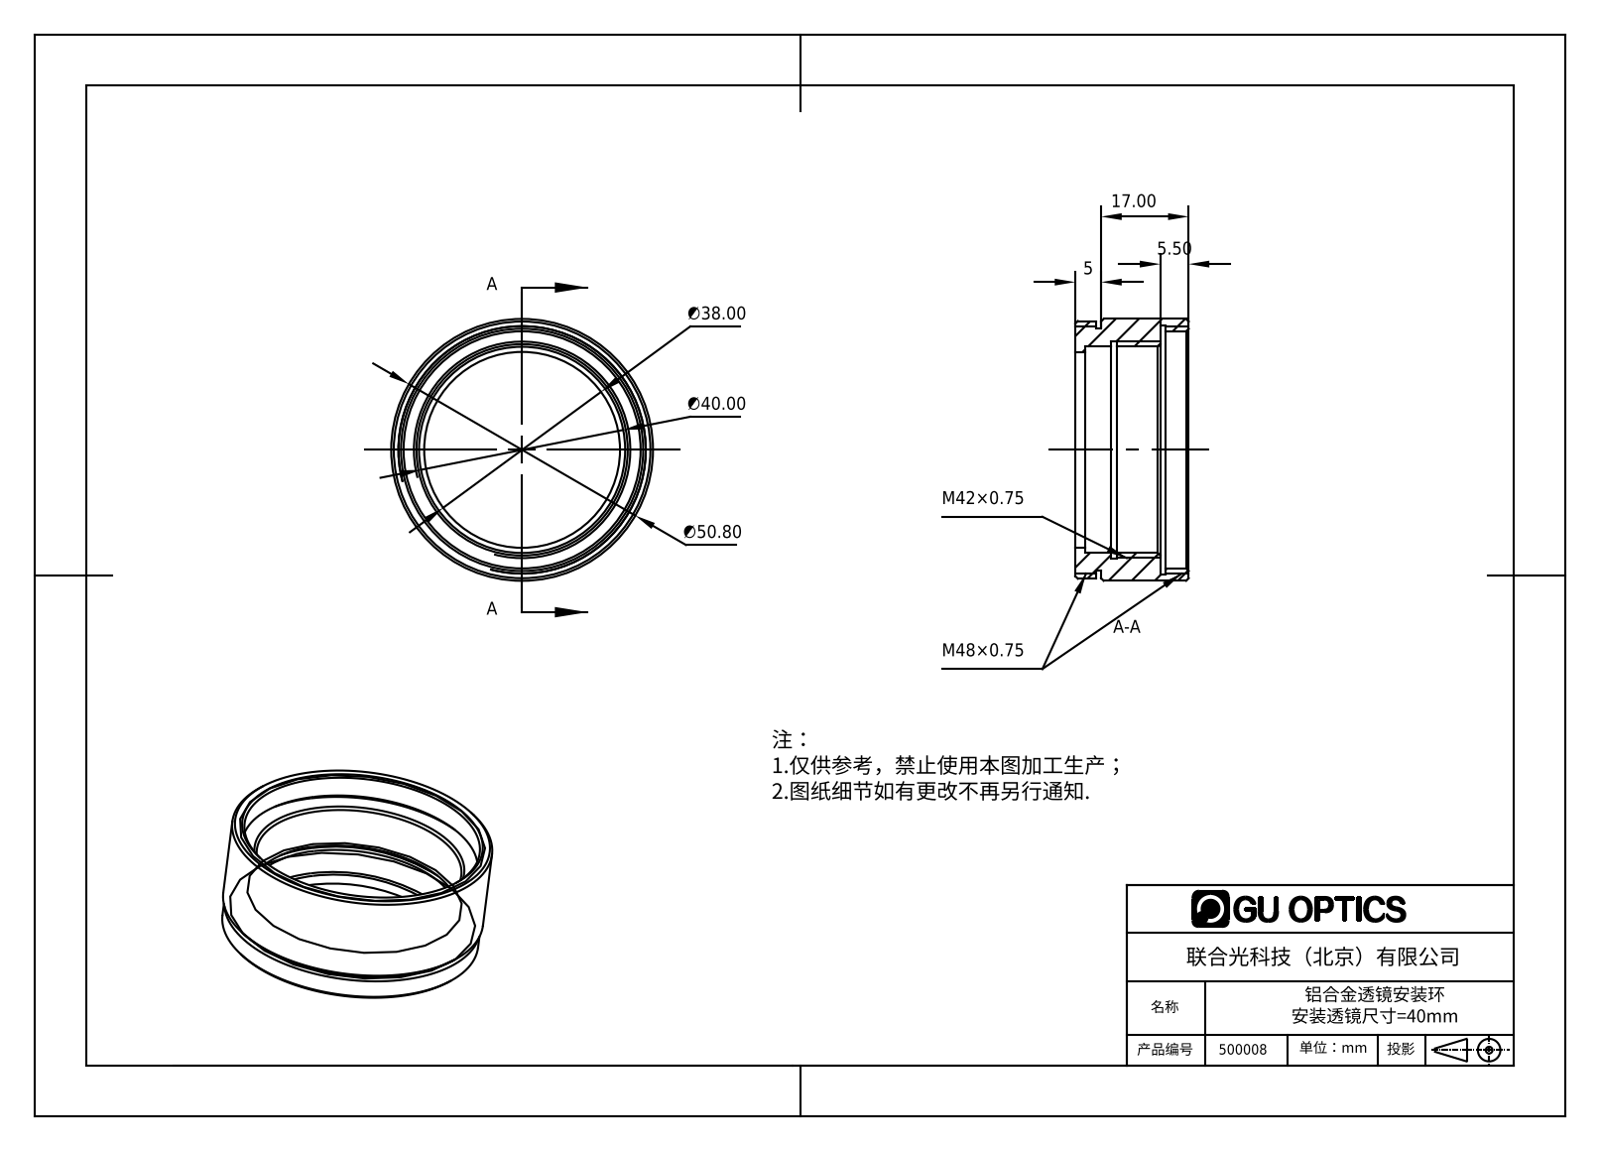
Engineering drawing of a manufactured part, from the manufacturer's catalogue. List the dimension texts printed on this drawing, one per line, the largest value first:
∅50.80
∅40.00
∅38.00
17.00
5.50
5
